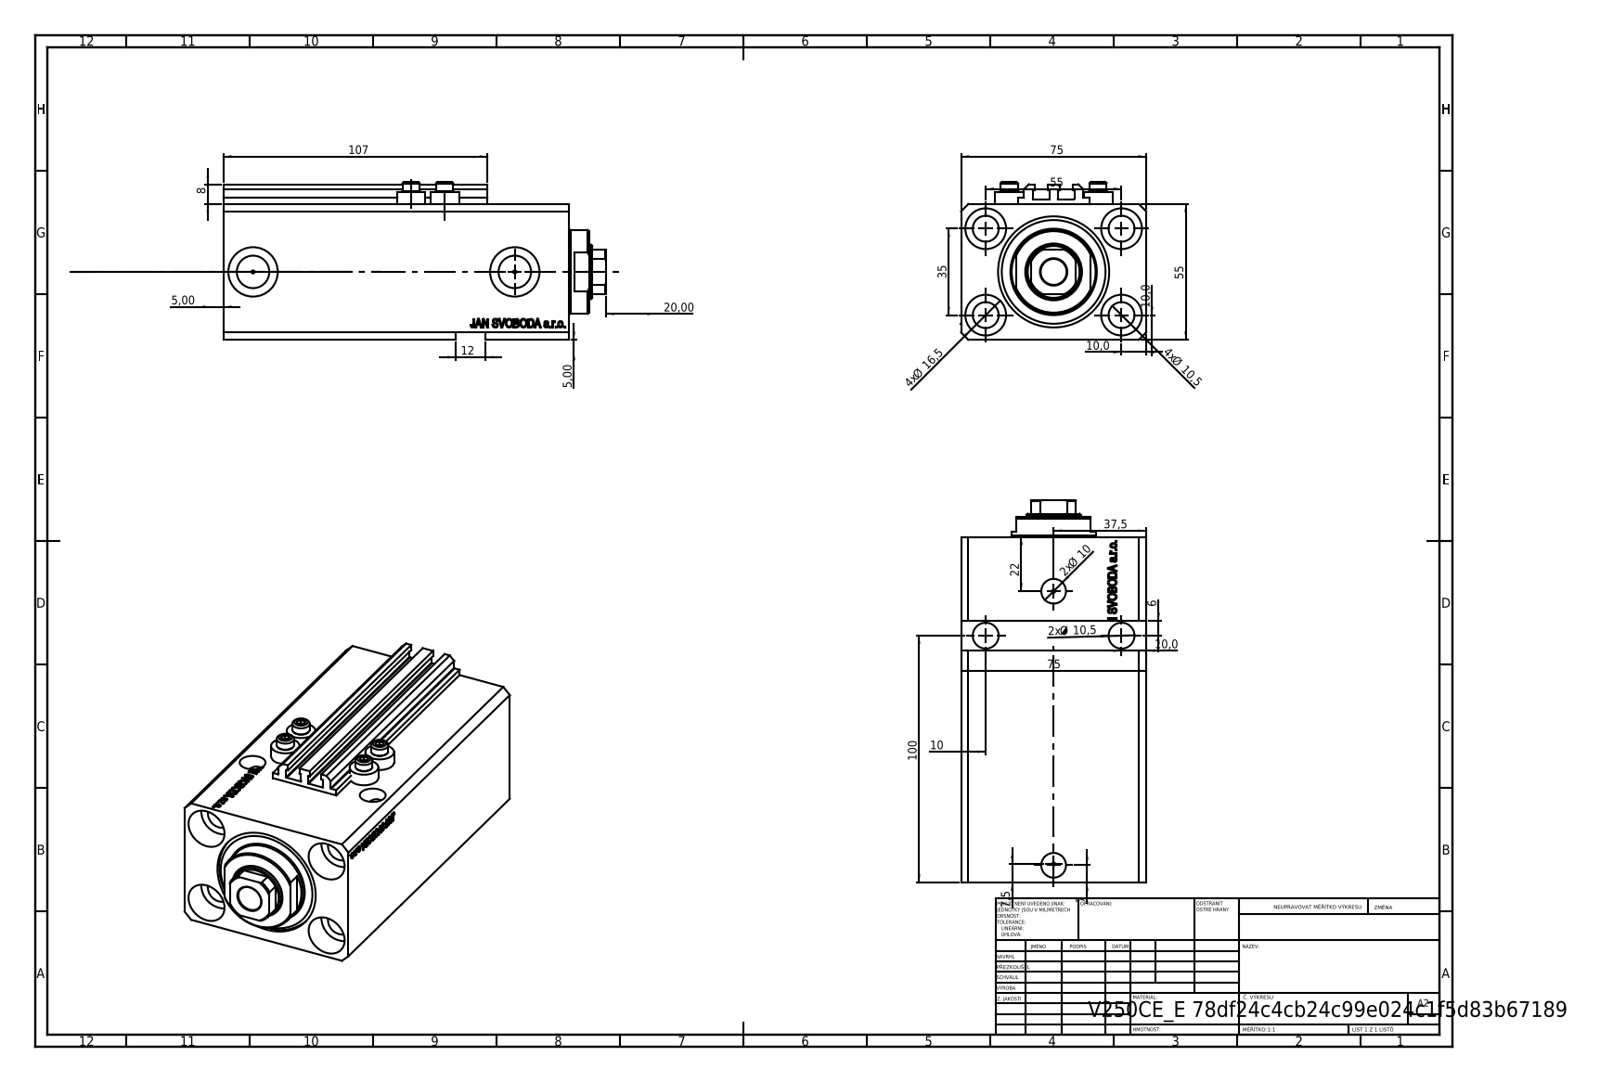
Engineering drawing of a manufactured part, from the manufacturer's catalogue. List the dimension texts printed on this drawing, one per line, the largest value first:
107
100
75
75
55
55
37,5
35
22
20,00
4x Ø 16,5
12
4x Ø 10,5
2x Ø 10,5
10,0
10,0
2x Ø 10
10,0
10
8
7,5
7
6
5,00
5,00
